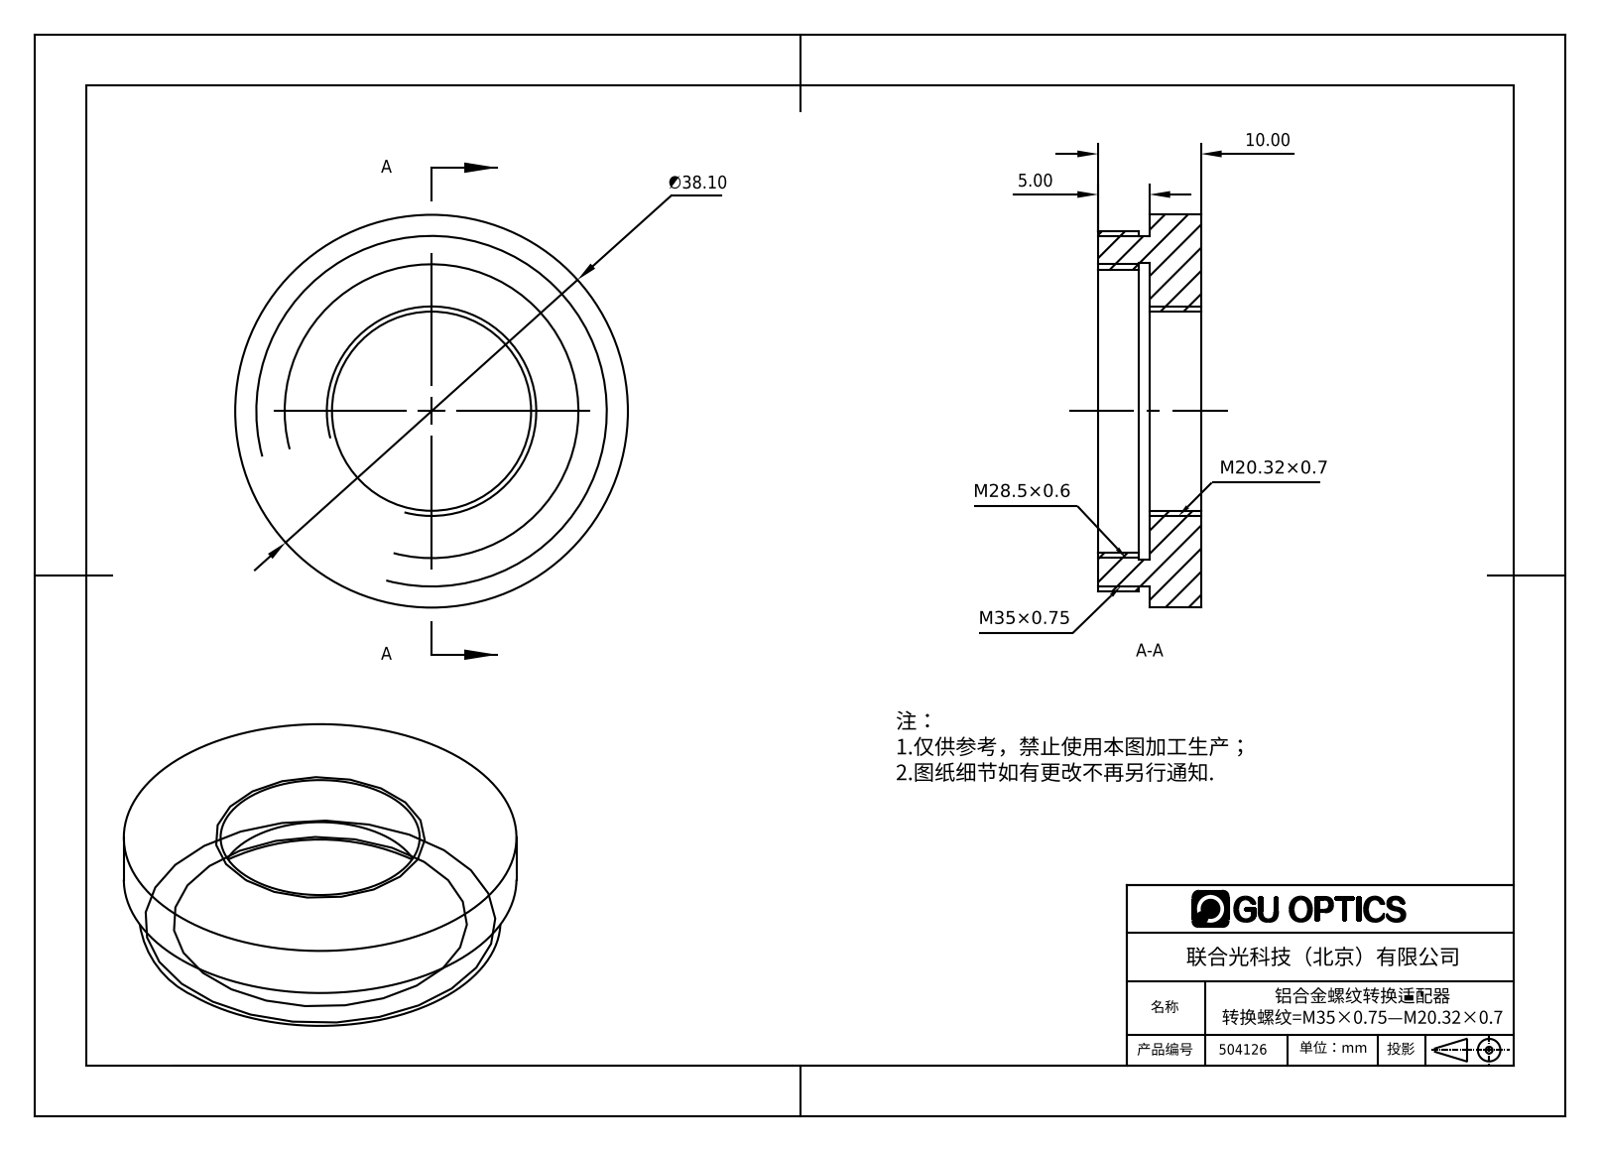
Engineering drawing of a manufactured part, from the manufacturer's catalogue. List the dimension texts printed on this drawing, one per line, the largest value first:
∅38.10
10.00
5.00
